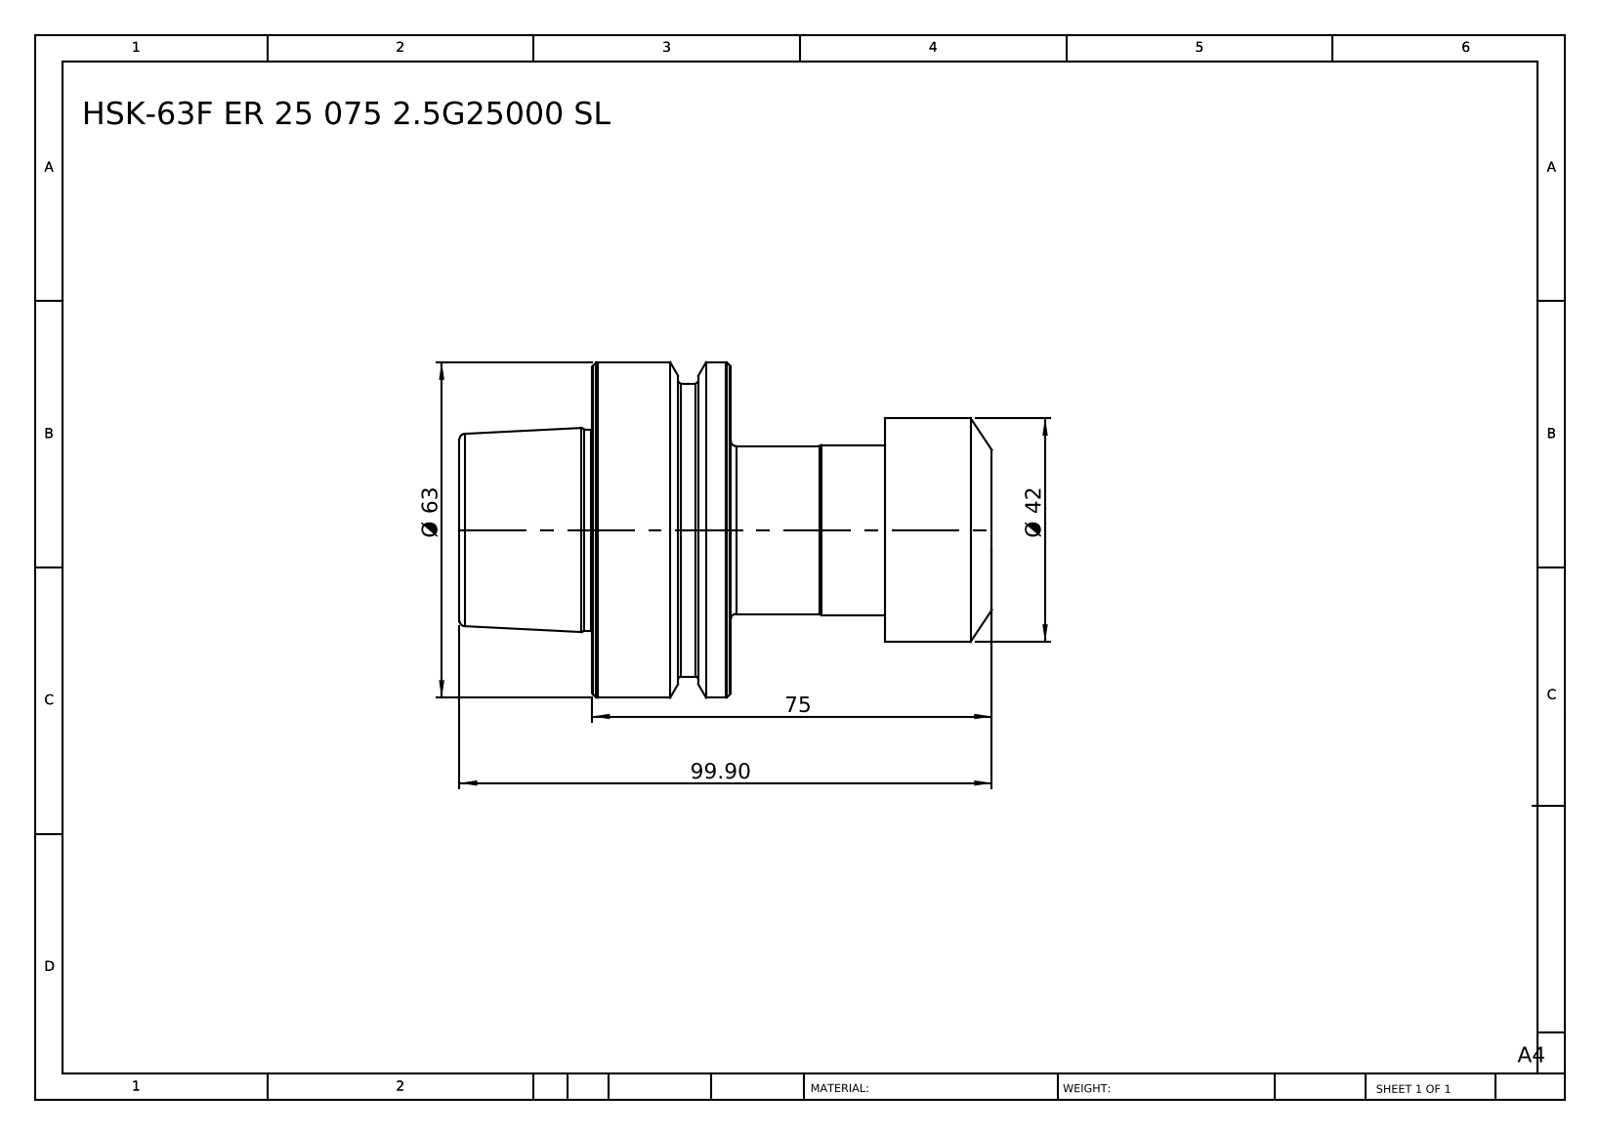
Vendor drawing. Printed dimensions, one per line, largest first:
99.90
75
Ø 63
Ø 42
